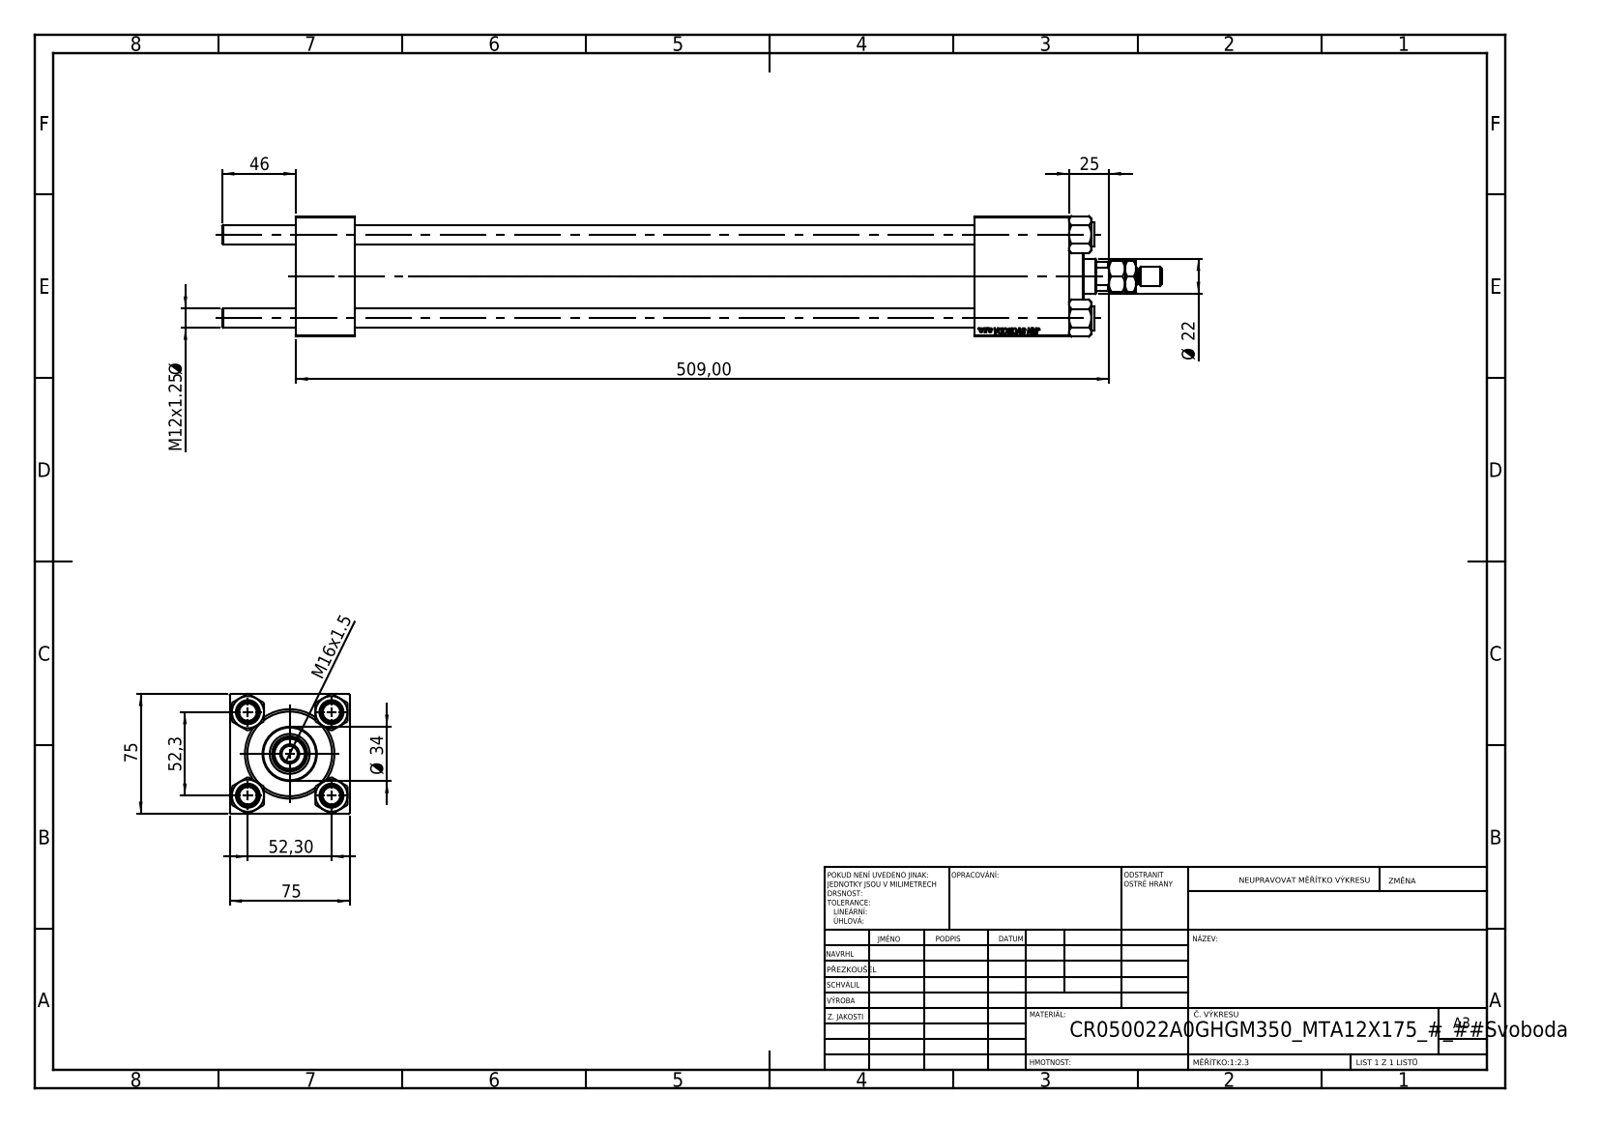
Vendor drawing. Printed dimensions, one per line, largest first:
509,00
75
75
52,3
52,30
46
Ø 34
25
Ø 22
M16x1.5
M12x1.25 Ø
